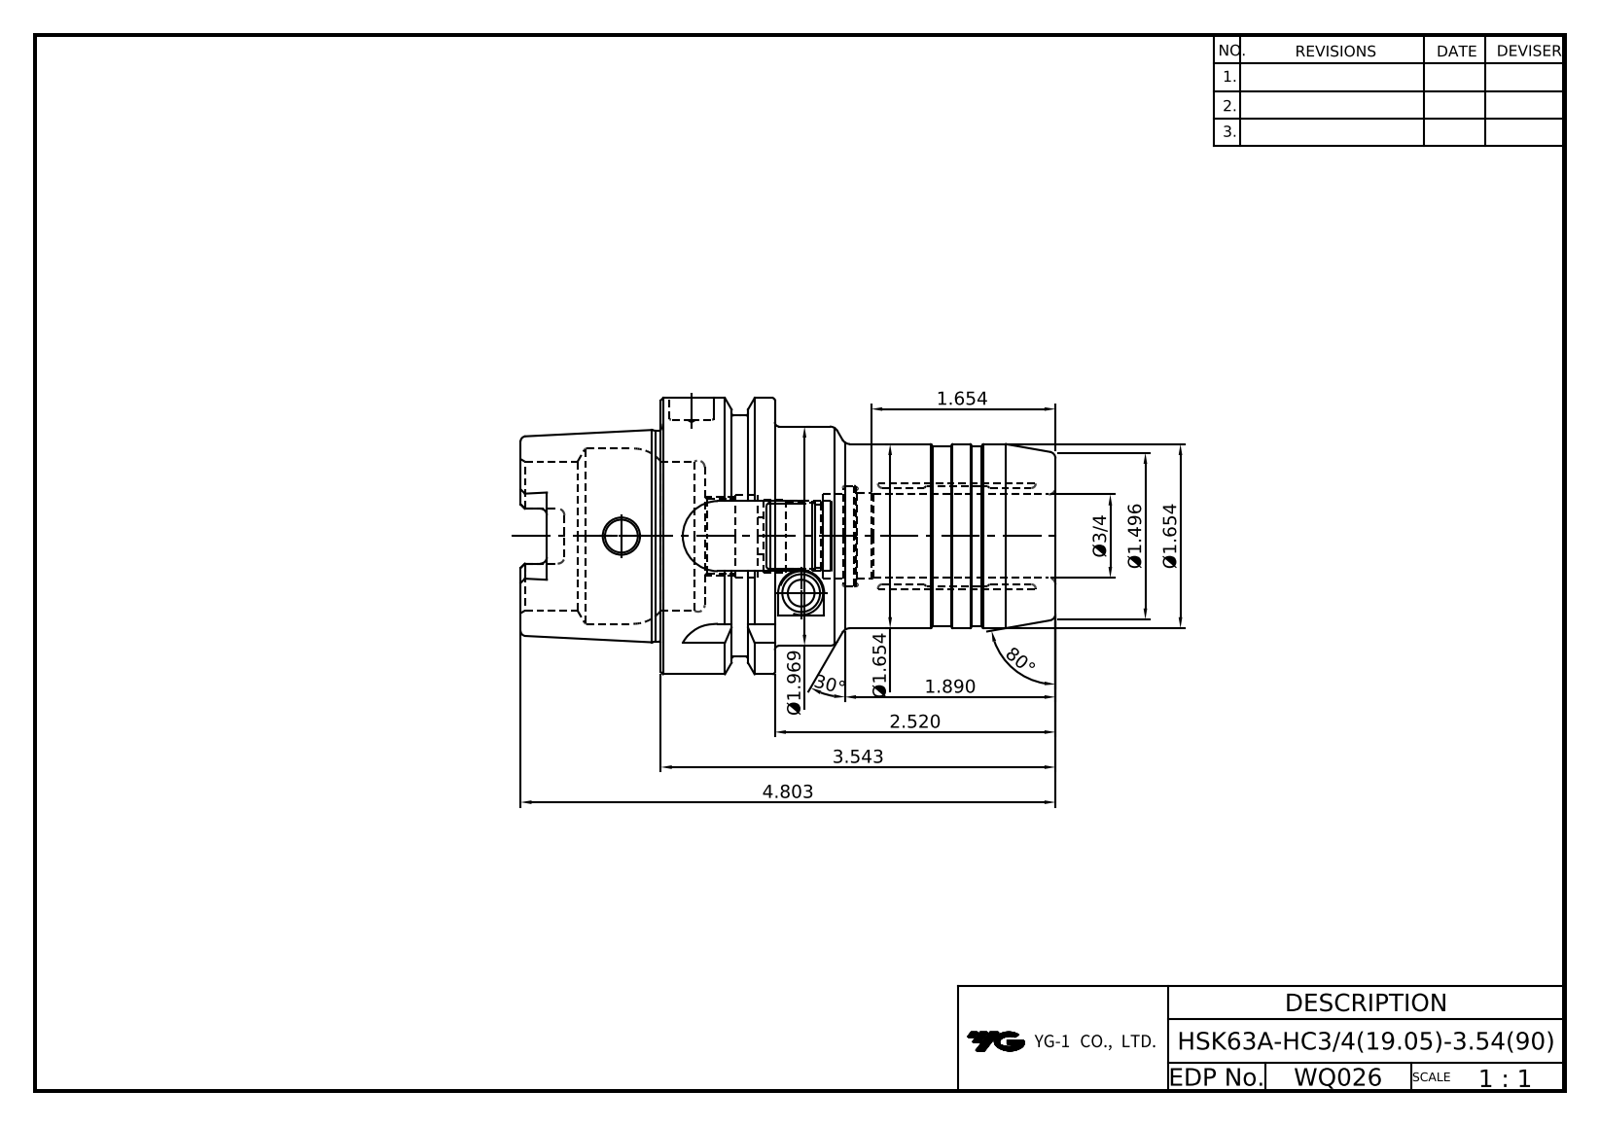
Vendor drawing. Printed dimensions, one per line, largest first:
80°
30°
4.803
3.543
2.520
Ø1.969
1.890
Ø1.654
Ø1.654
1.654
Ø1.496
Ø3/4
